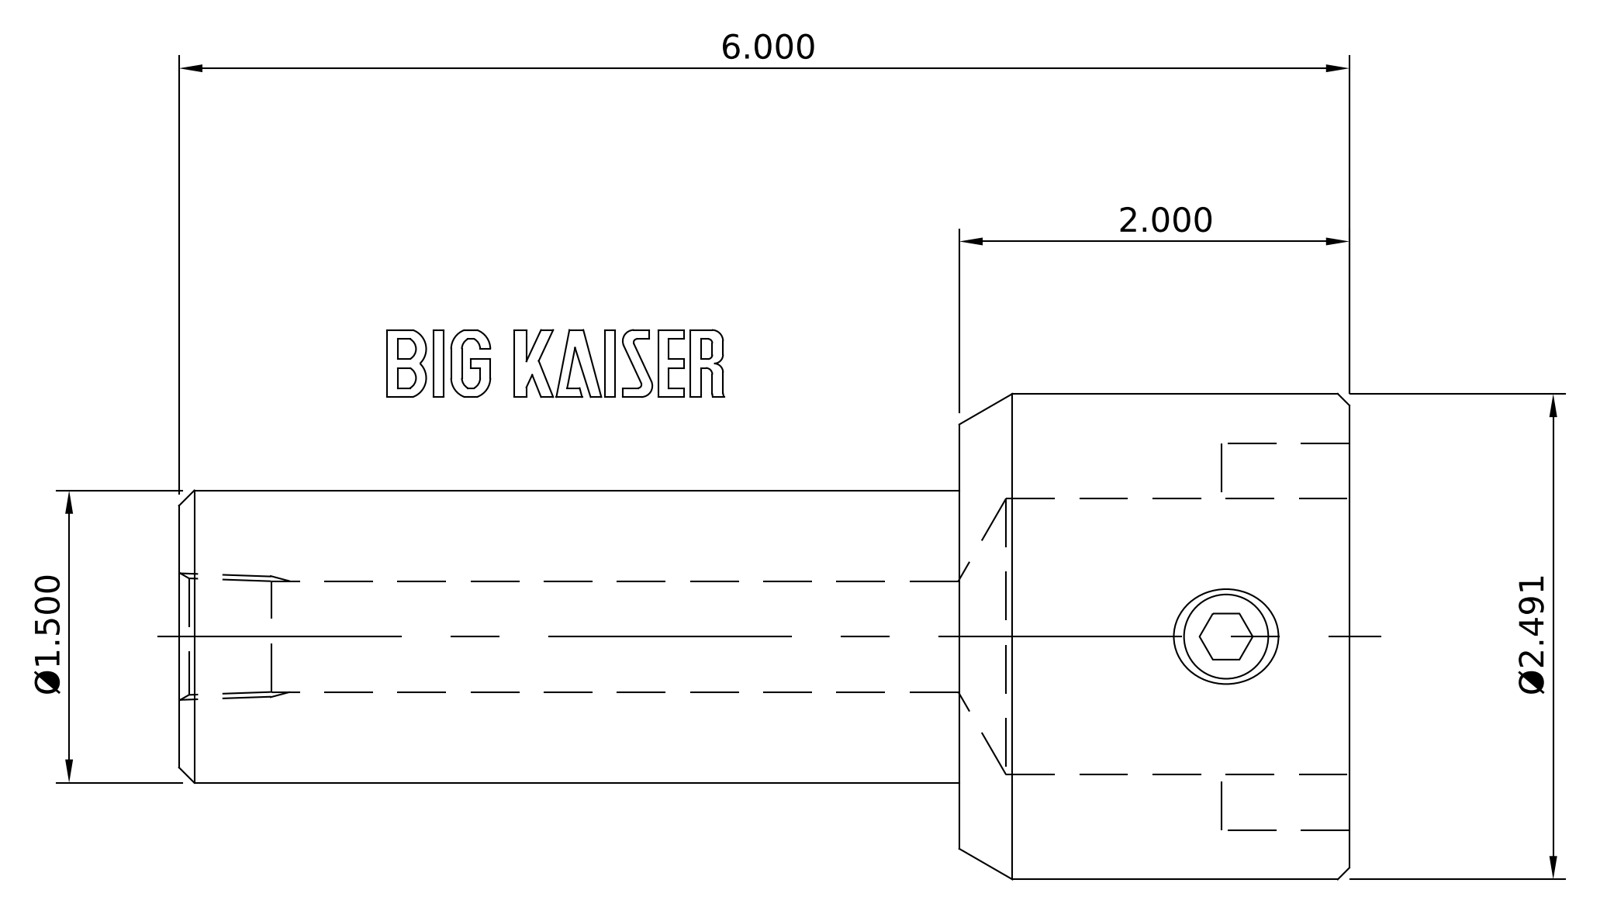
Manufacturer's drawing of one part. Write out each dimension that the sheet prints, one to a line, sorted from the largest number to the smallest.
6.000
Ø2.491
2.000
Ø1.500
